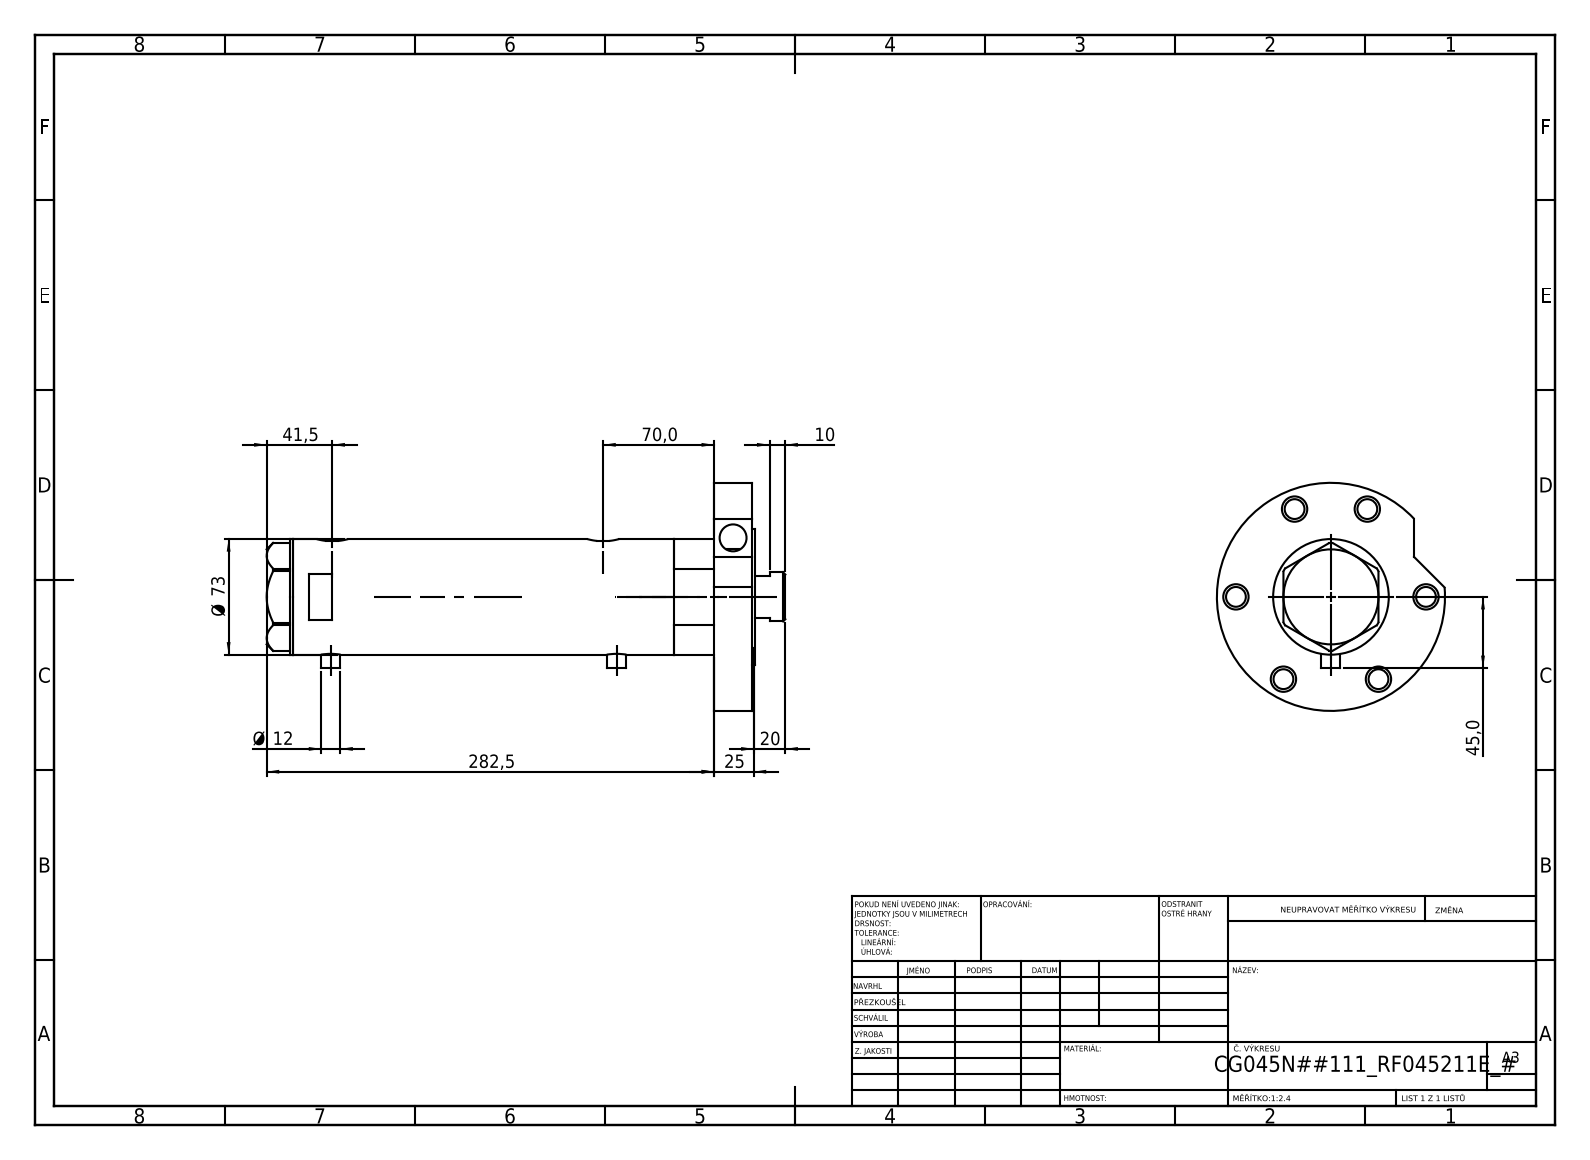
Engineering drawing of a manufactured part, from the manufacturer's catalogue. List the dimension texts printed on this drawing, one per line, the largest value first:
282,5
Ø 73
70,0
45,0
41,5
25
20
Ø 12
10
